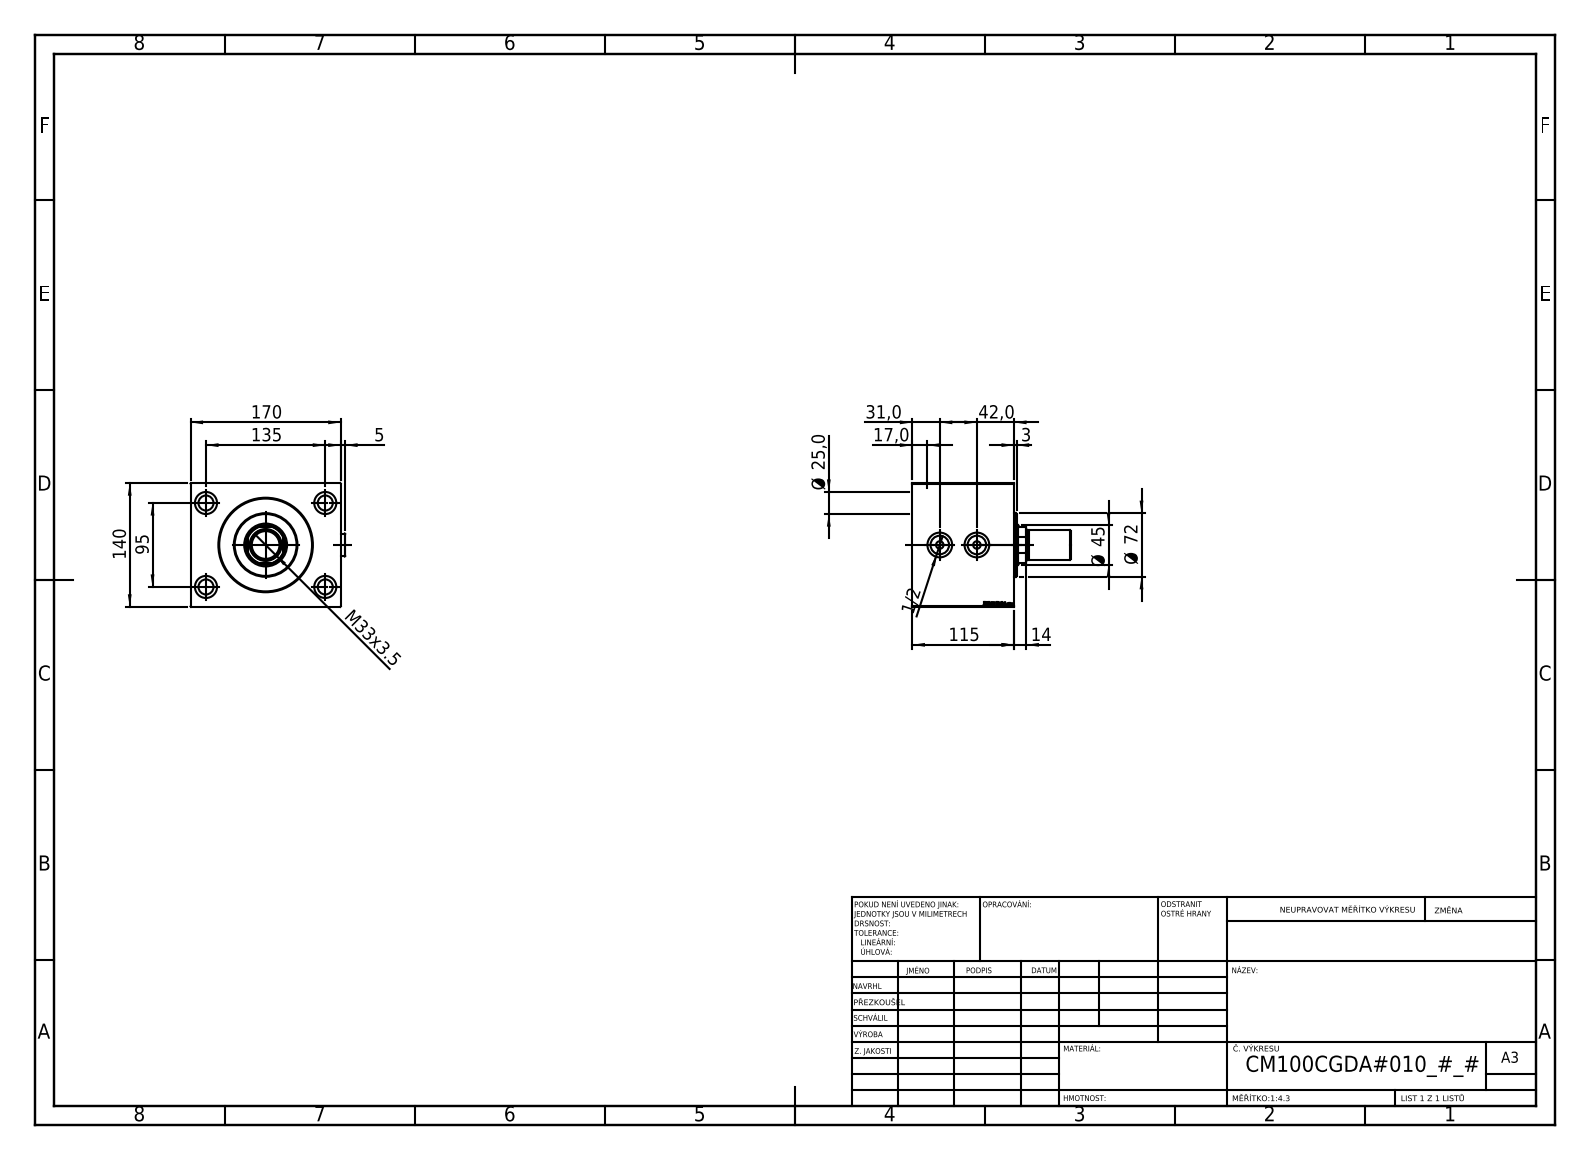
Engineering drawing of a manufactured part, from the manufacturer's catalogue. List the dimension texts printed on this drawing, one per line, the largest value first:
170
140
135
115
95
Ø 72
Ø 45
42,0
M33x3.5
31,0
Ø 25,0
17,0
14
5
3
1/2
